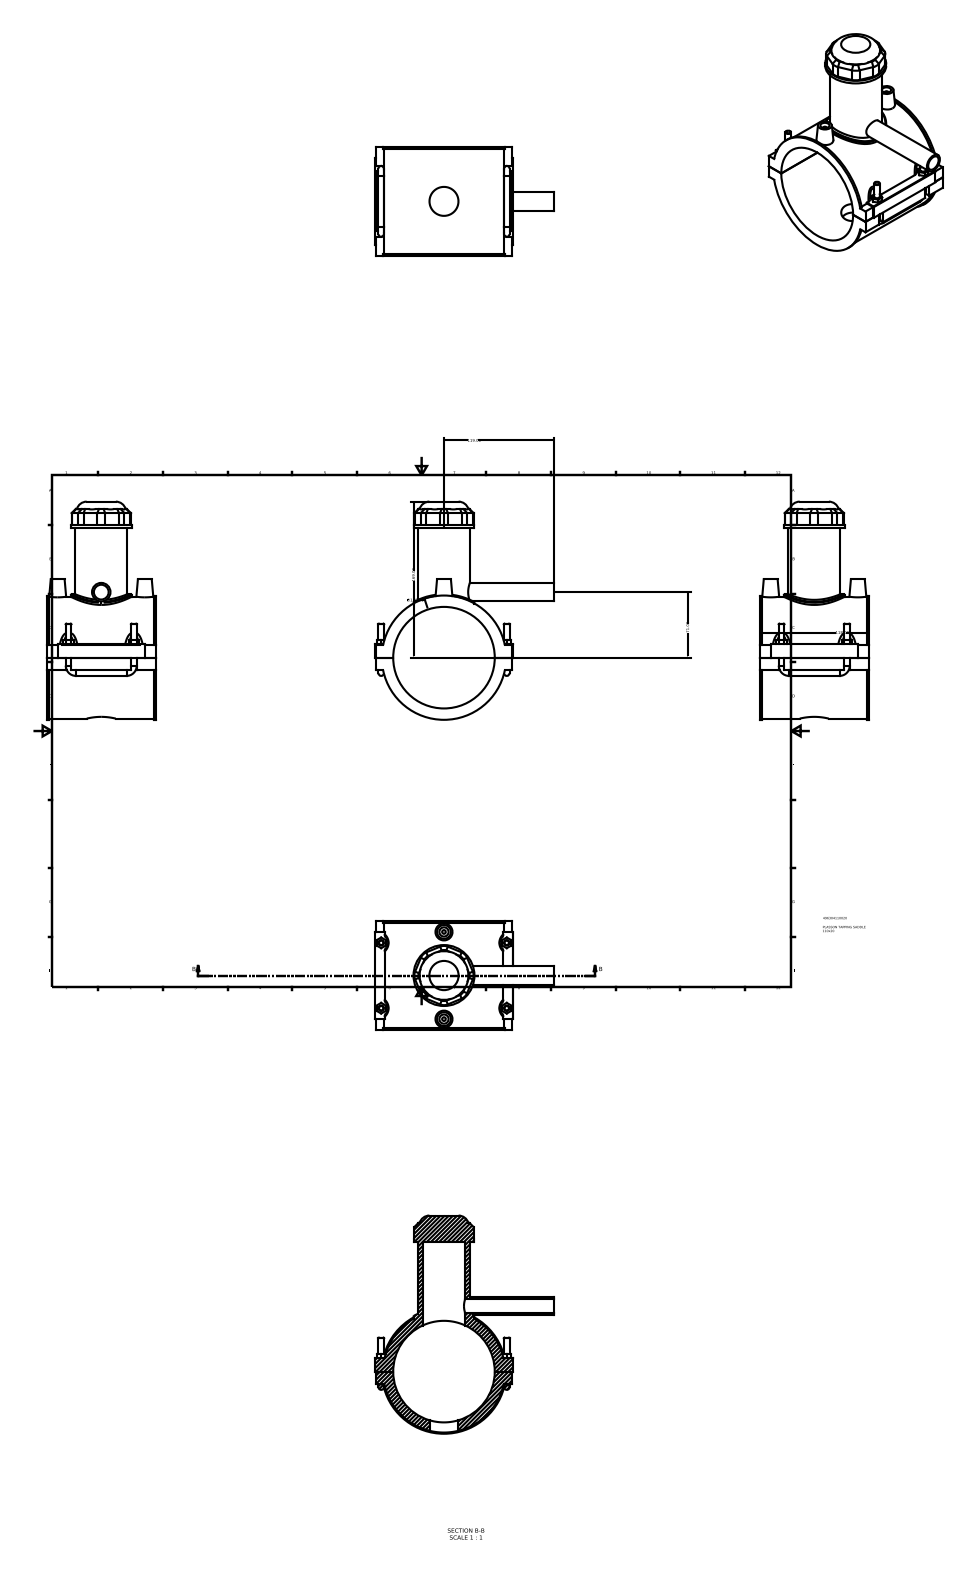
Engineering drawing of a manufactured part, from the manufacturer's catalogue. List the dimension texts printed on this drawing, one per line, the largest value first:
169.00
119.00
118.00
∅110.00
71.00
